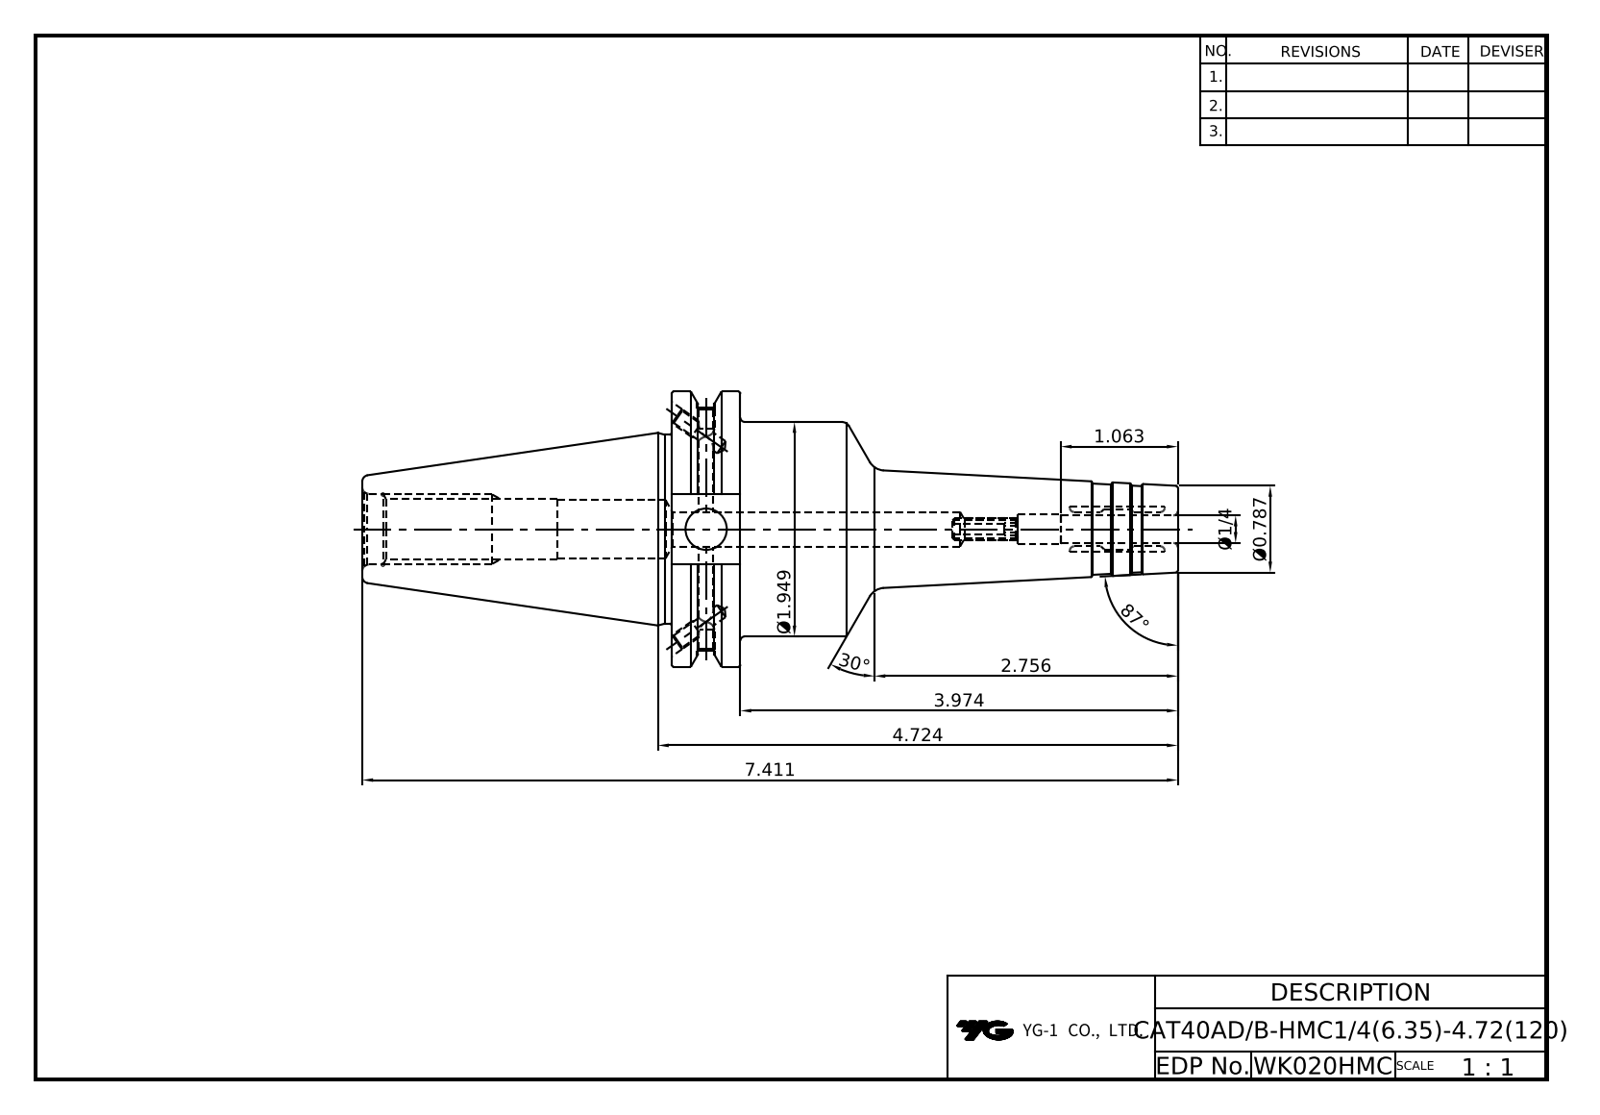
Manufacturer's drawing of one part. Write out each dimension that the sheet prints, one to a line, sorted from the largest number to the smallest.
87°
30°
7.411
4.724
3.974
2.756
Ø1.949
1.063
Ø0.787
Ø1/4
